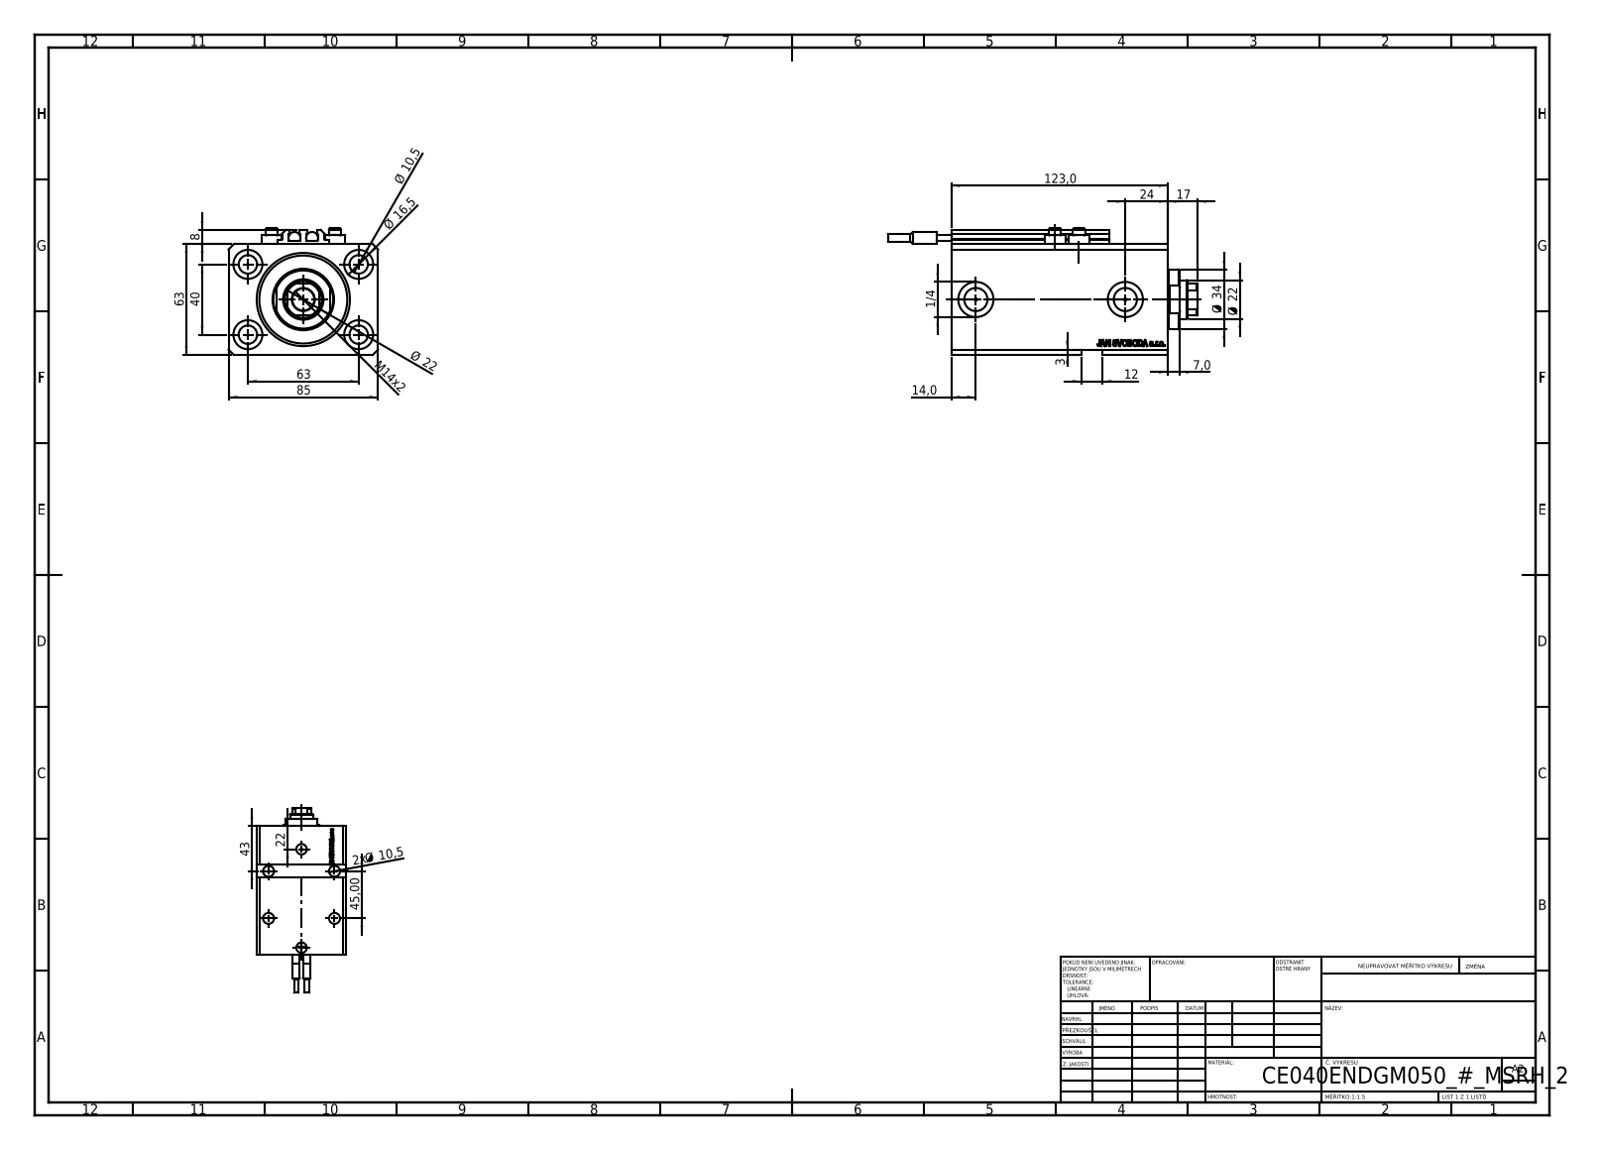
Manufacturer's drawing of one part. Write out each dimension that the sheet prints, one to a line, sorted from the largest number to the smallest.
123,0
85
63
63
45,00
43
40
Ø 34
24
Ø 22
Ø 22
22
17
Ø 16,5
M14x2
14,0
12
Ø 10,5
2x Ø 10,5
8
7,0
3
1/4
